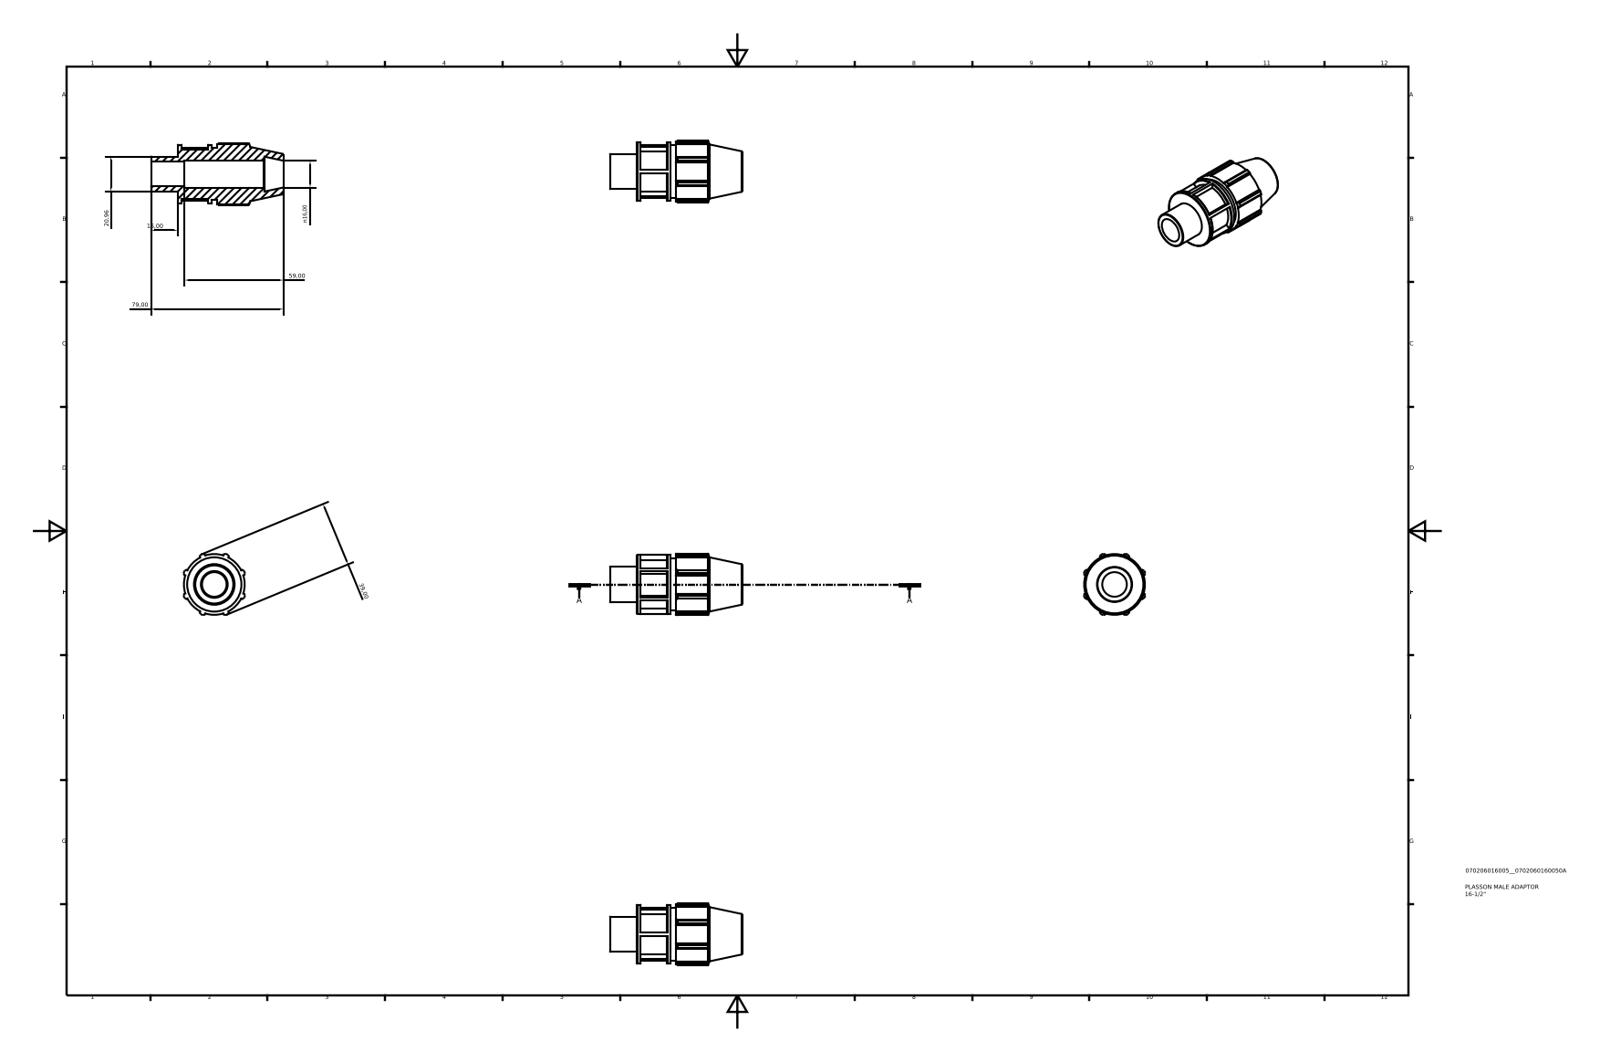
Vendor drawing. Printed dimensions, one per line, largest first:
79,00
59,00
39,00
20,96
n16,00
16,00
